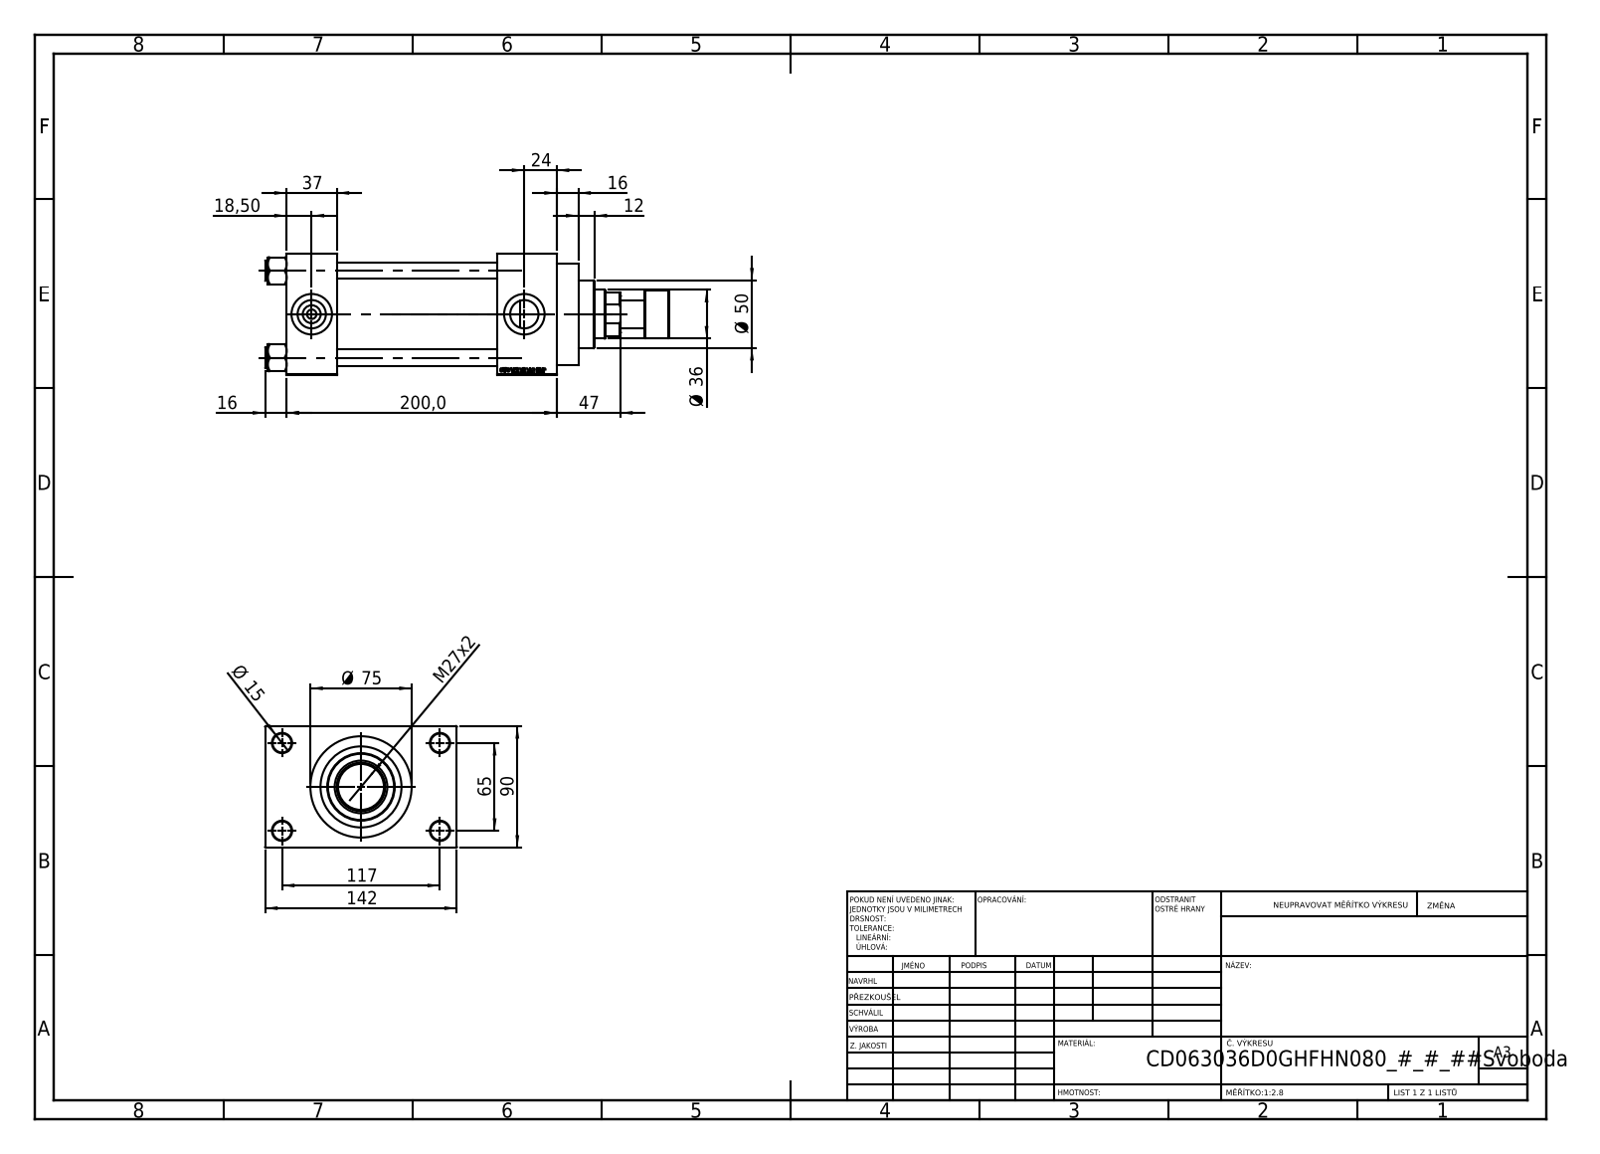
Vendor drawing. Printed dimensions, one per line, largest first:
200,0
142
117
90
Ø 75
65
Ø 50
47
37
Ø 36
M27x2
24
18,50
16
16
Ø 15
12
